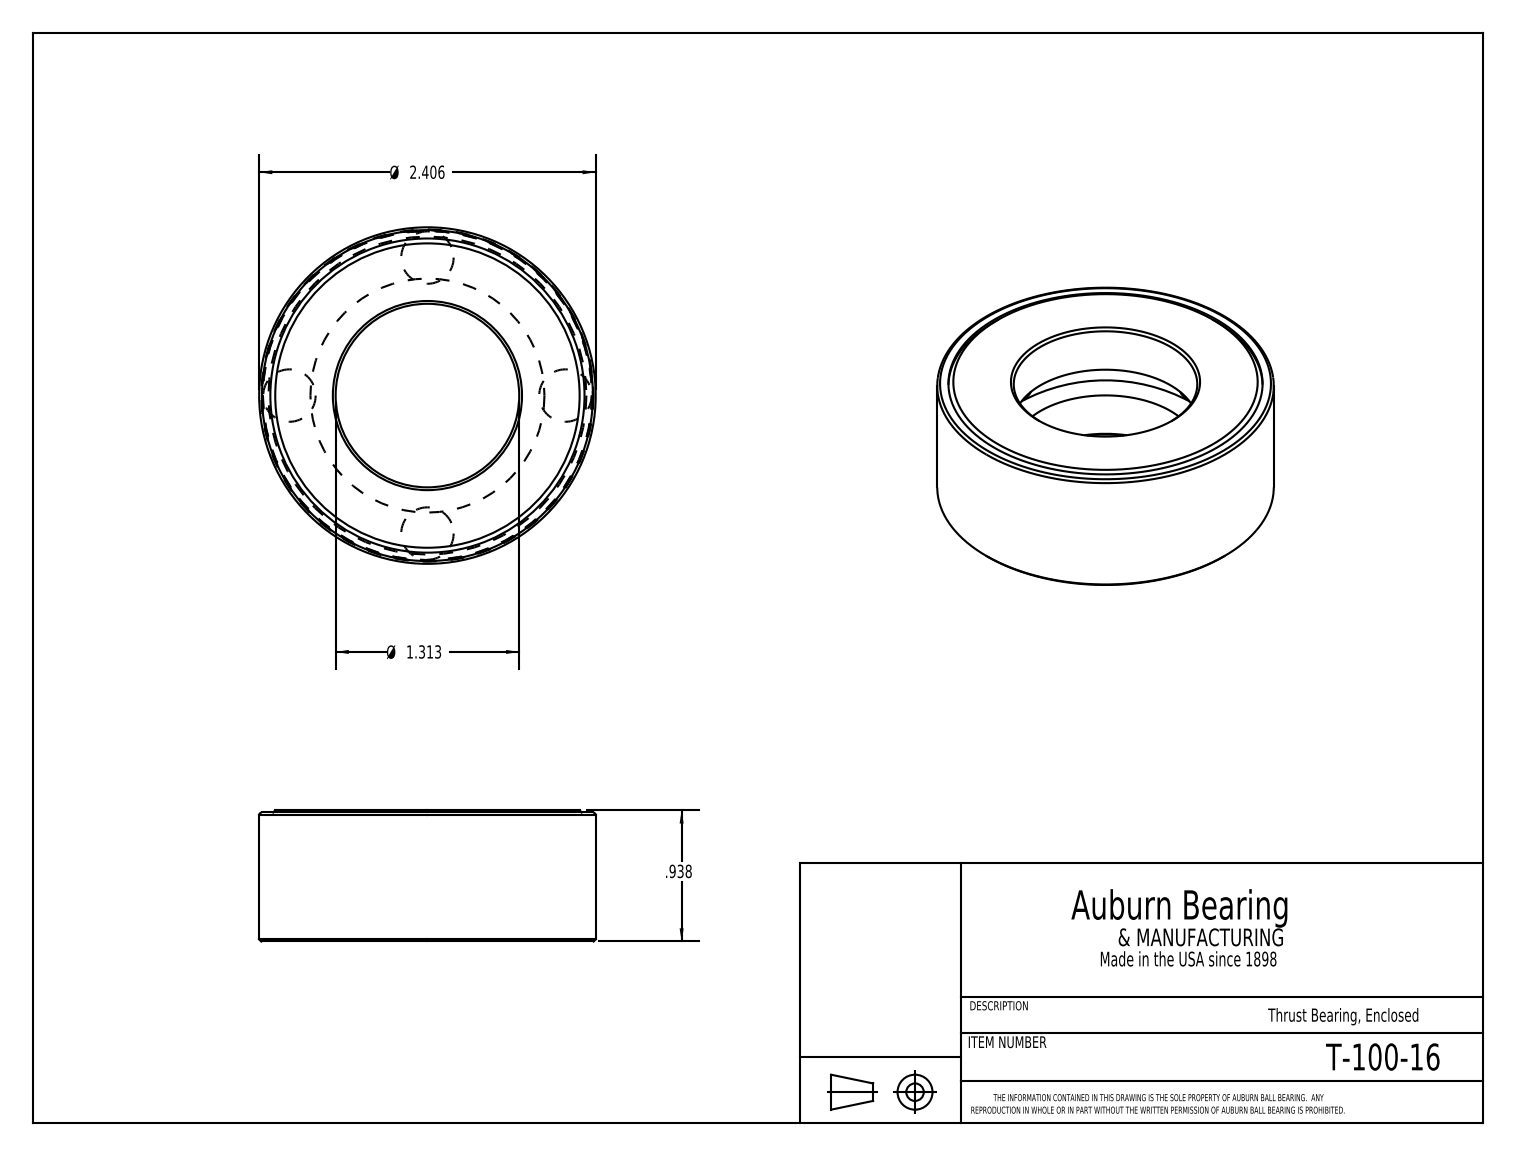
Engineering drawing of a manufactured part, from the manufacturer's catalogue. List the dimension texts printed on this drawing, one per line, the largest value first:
Ø 2.406
Ø 1.313
.938
